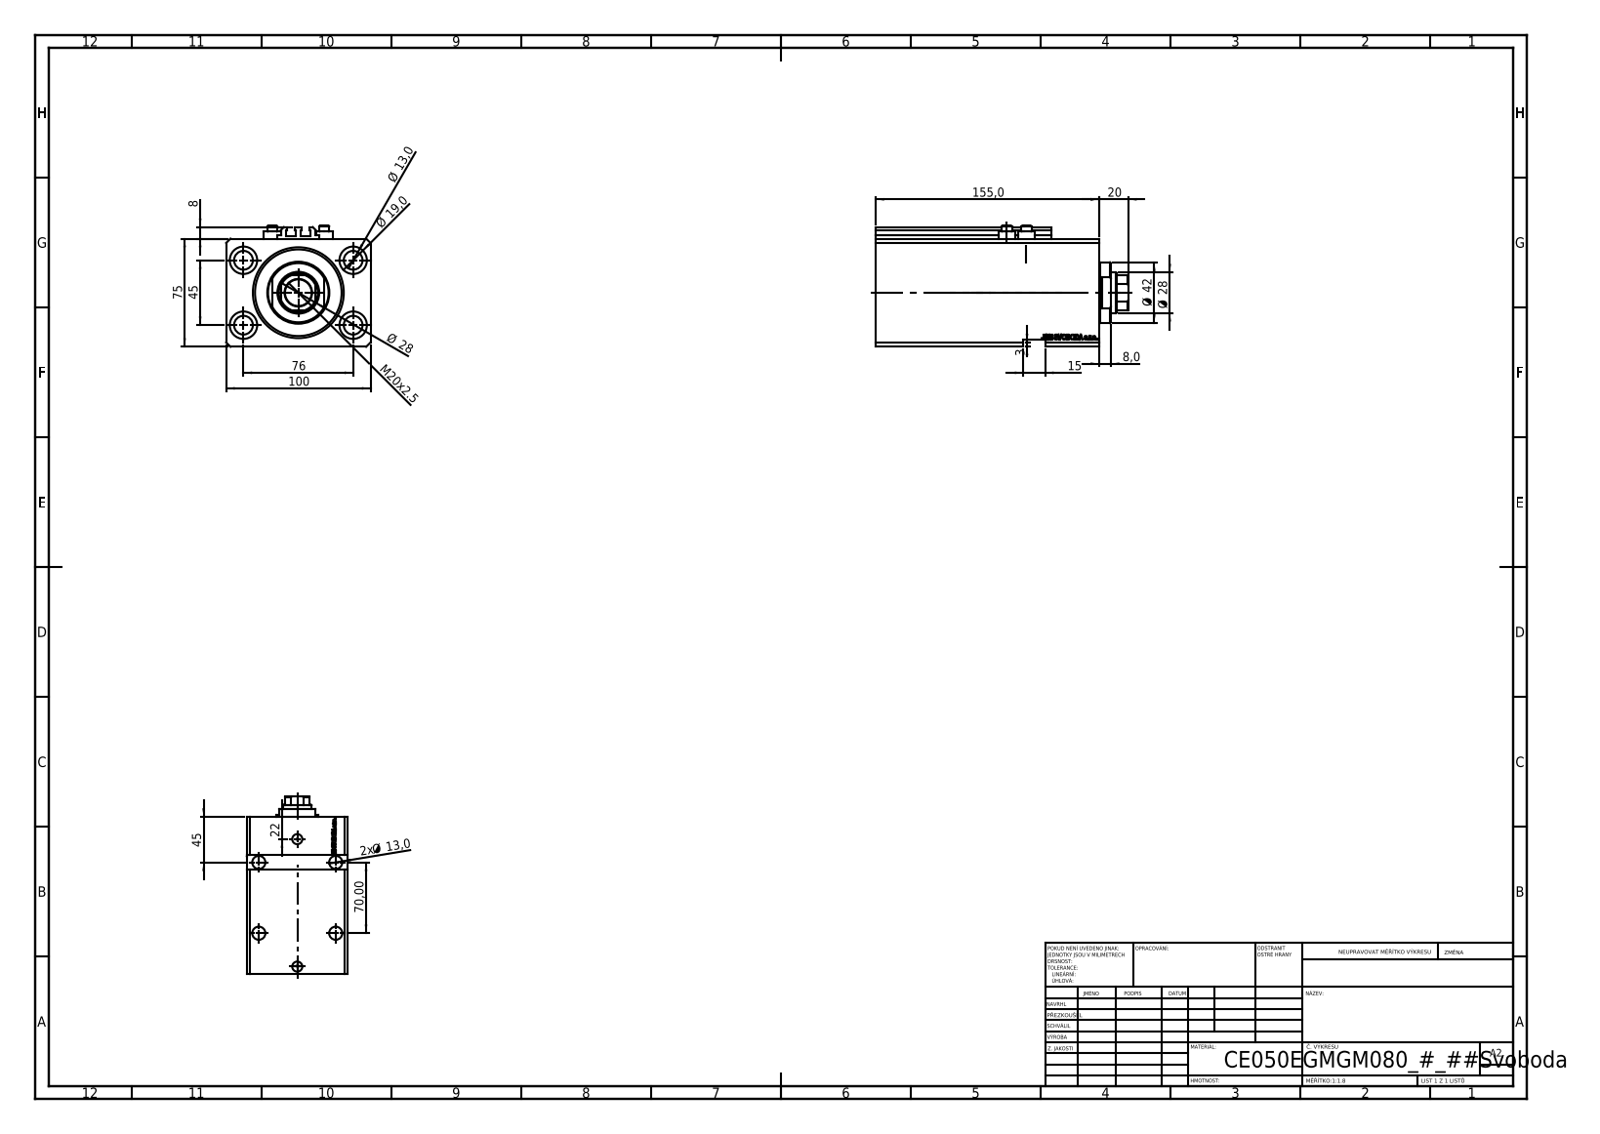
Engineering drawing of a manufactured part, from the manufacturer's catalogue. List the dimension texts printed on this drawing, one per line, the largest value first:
155,0
100
76
75
70,00
45
45
Ø 42
Ø 28
Ø 28
22
M20x2.5
20
Ø 19,0
15
Ø 13,0
2x Ø 13,0
8
8,0
3
